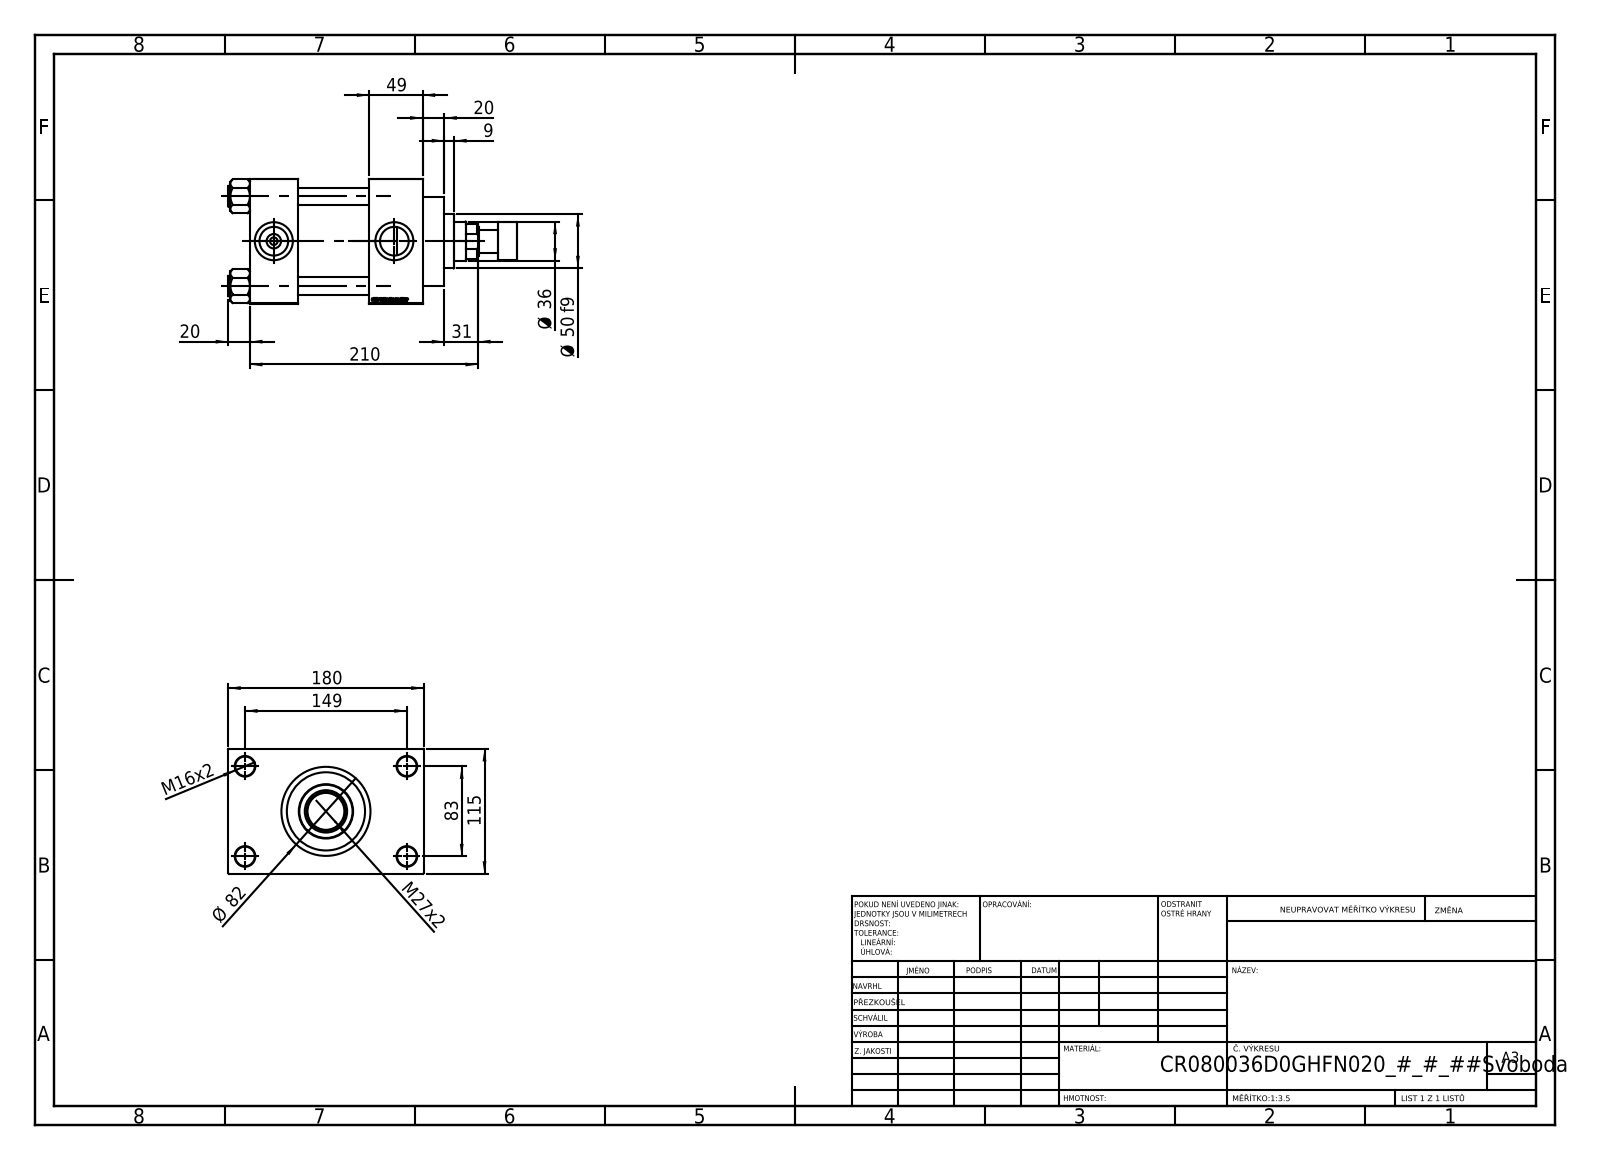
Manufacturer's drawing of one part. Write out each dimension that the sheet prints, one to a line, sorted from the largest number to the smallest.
210
180
149
115
83
Ø 82
Ø 50 f9
49
Ø 36
31
M27x2
20
20
M16x2
9
